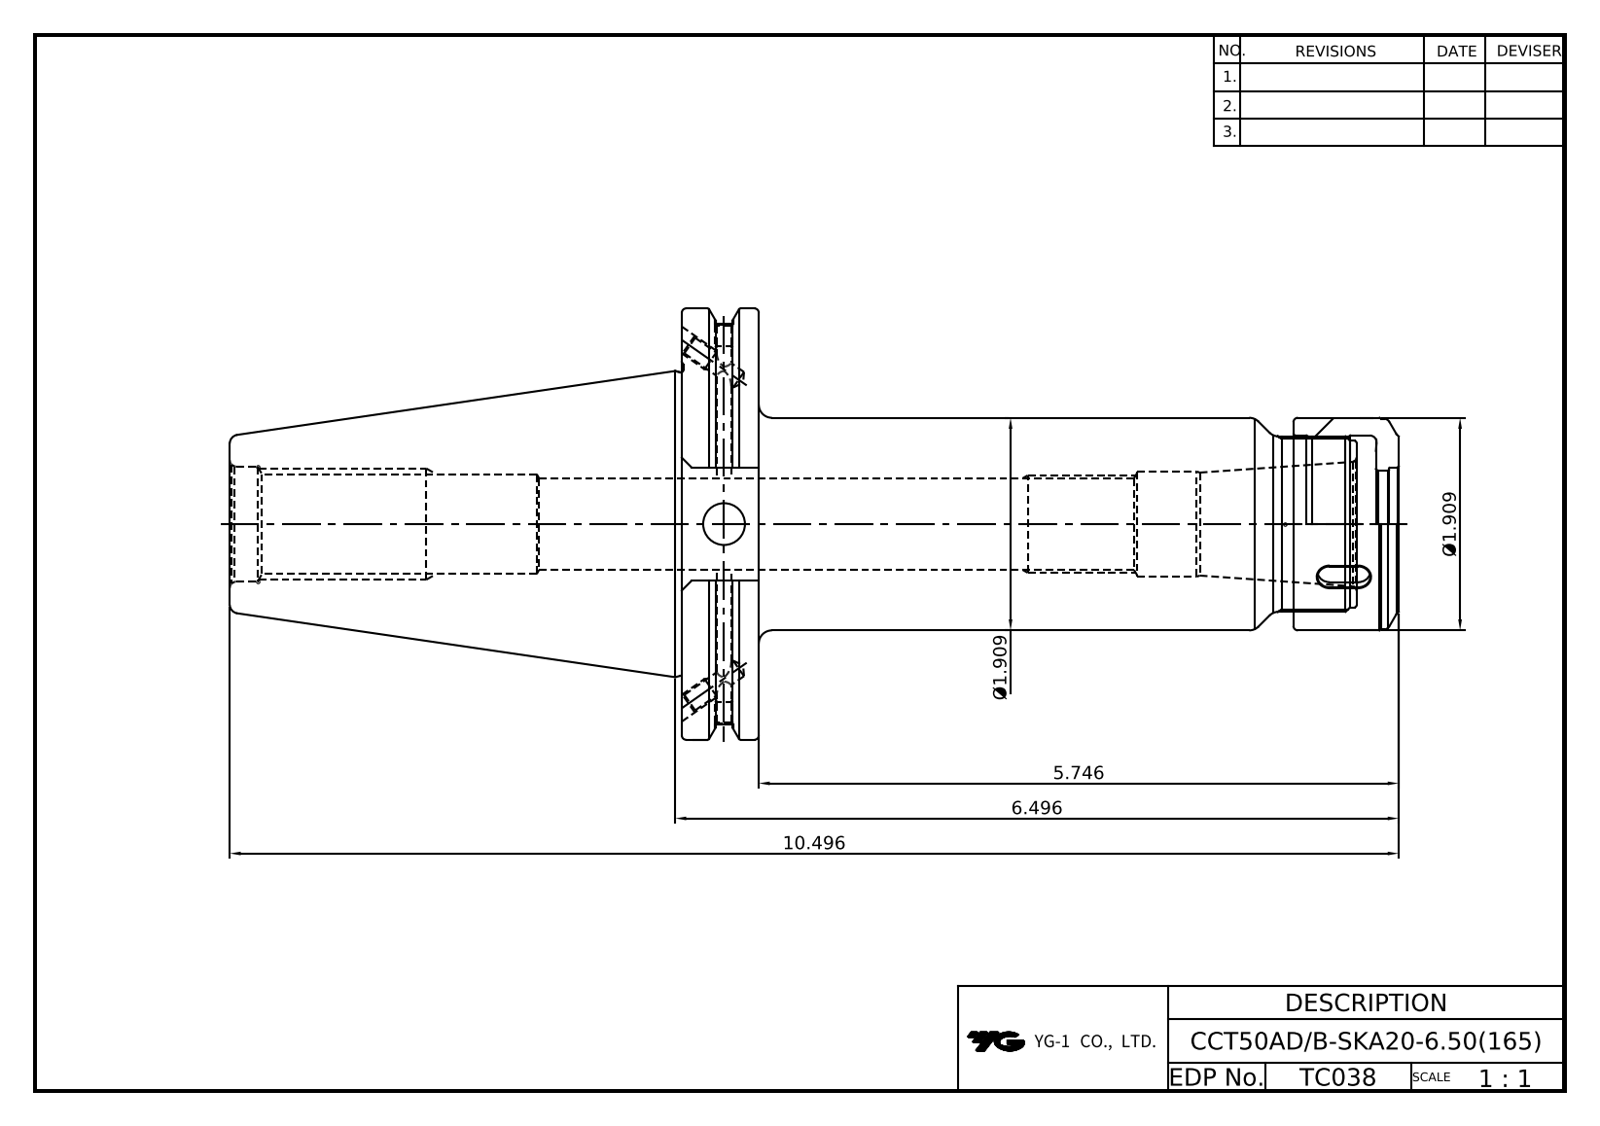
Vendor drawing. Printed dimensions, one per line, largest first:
10.496
6.496
5.746
Ø1.909
Ø1.909
